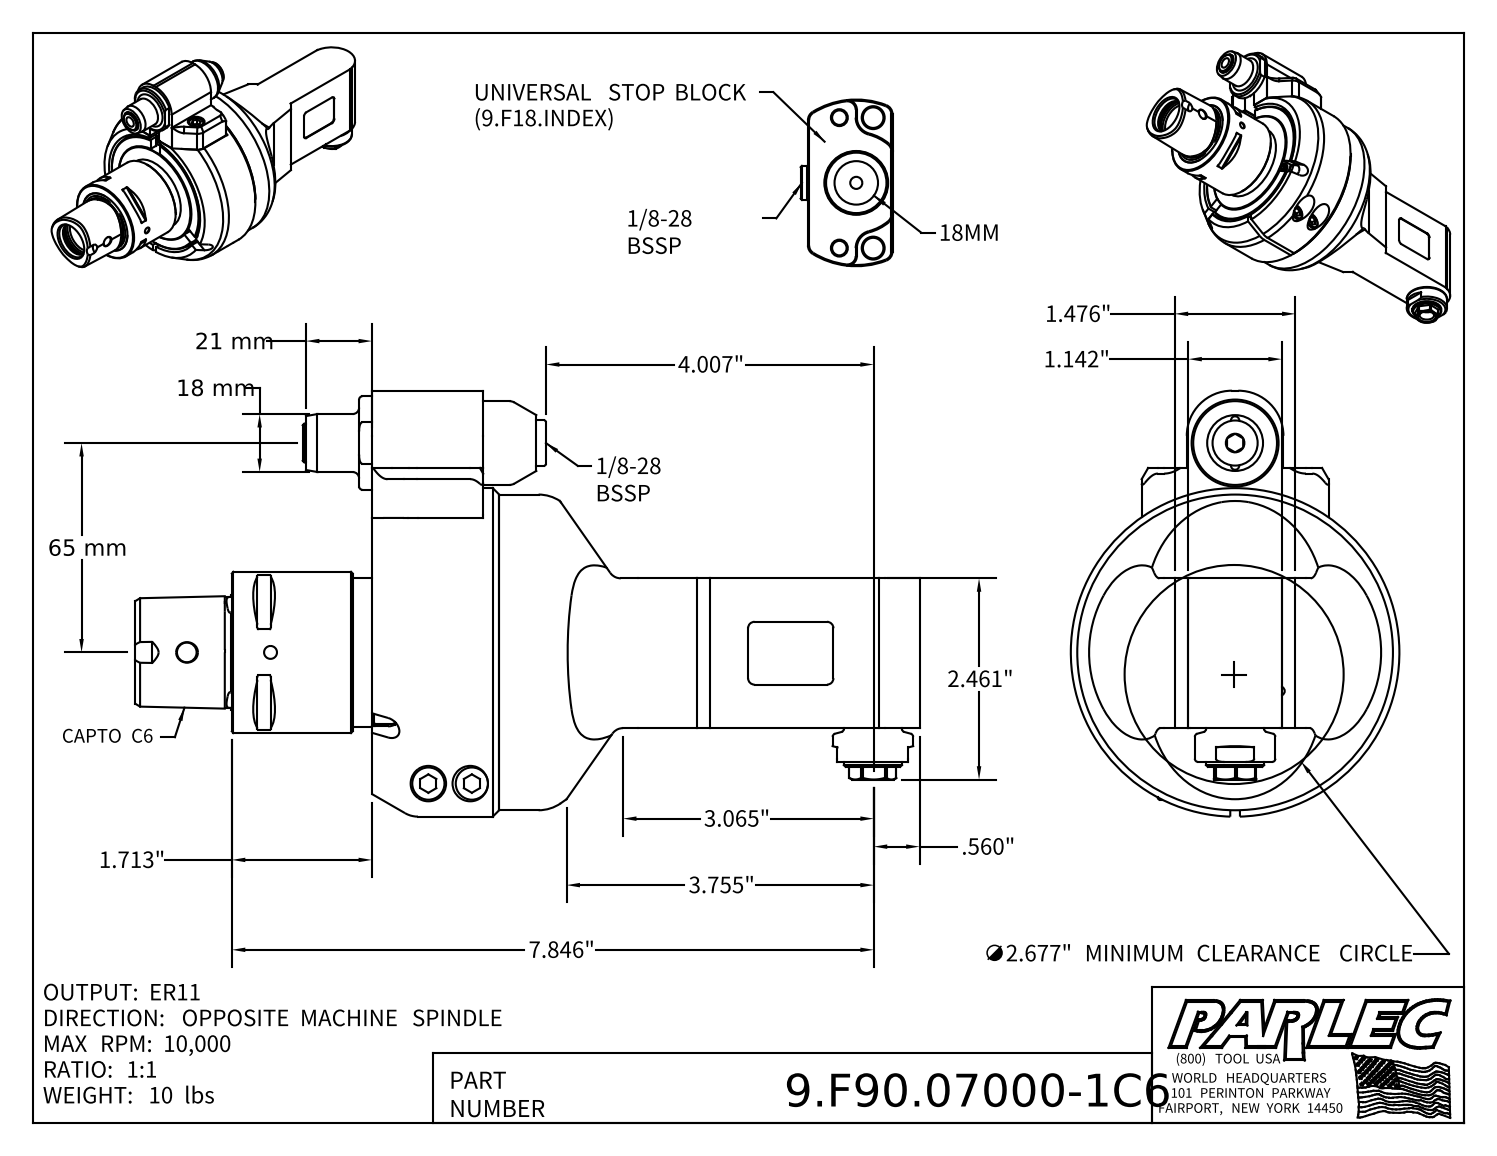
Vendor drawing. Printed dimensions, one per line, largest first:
65 mm
21 mm
18 mm
7.846"
4.007"
3.755"
3.065"
∅2.677" MINIMUM CLEARANCE CIRCLE
2.461"
1.713"
1.476"
1.142"
.560"
